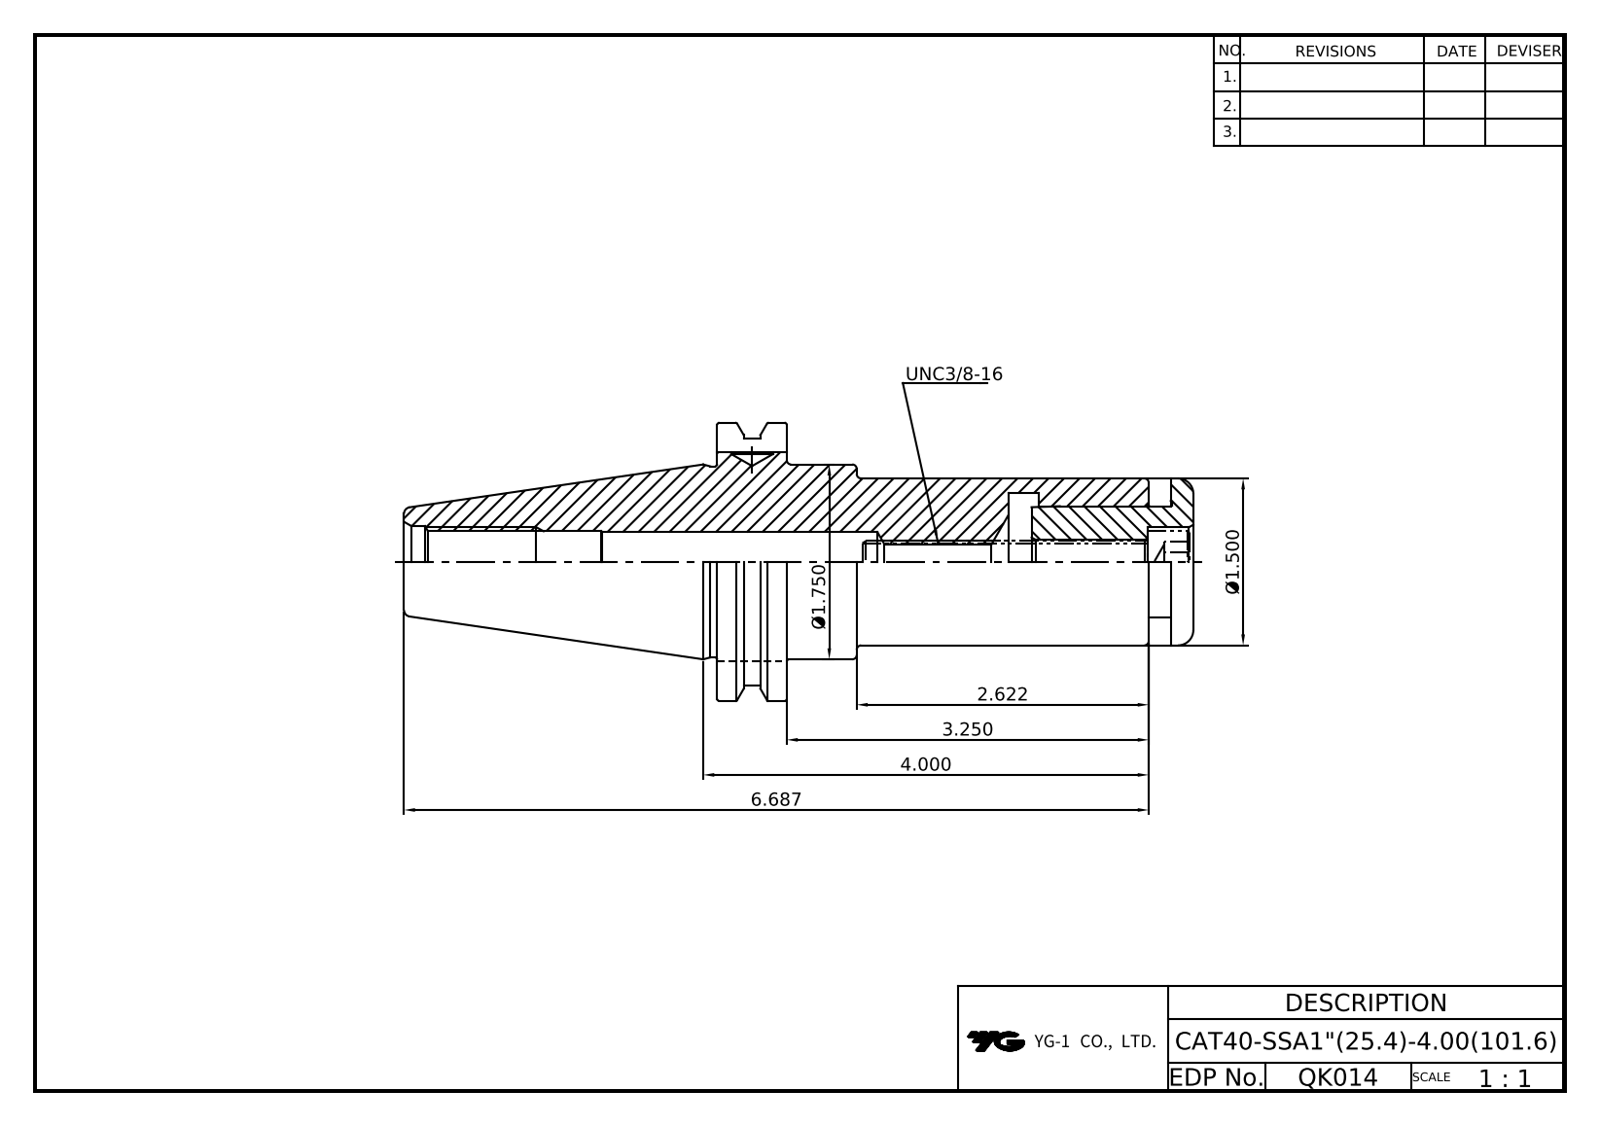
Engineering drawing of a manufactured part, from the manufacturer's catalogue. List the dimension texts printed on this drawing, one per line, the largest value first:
6.687
4.000
3.250
2.622
Ø1.750
Ø1.500
